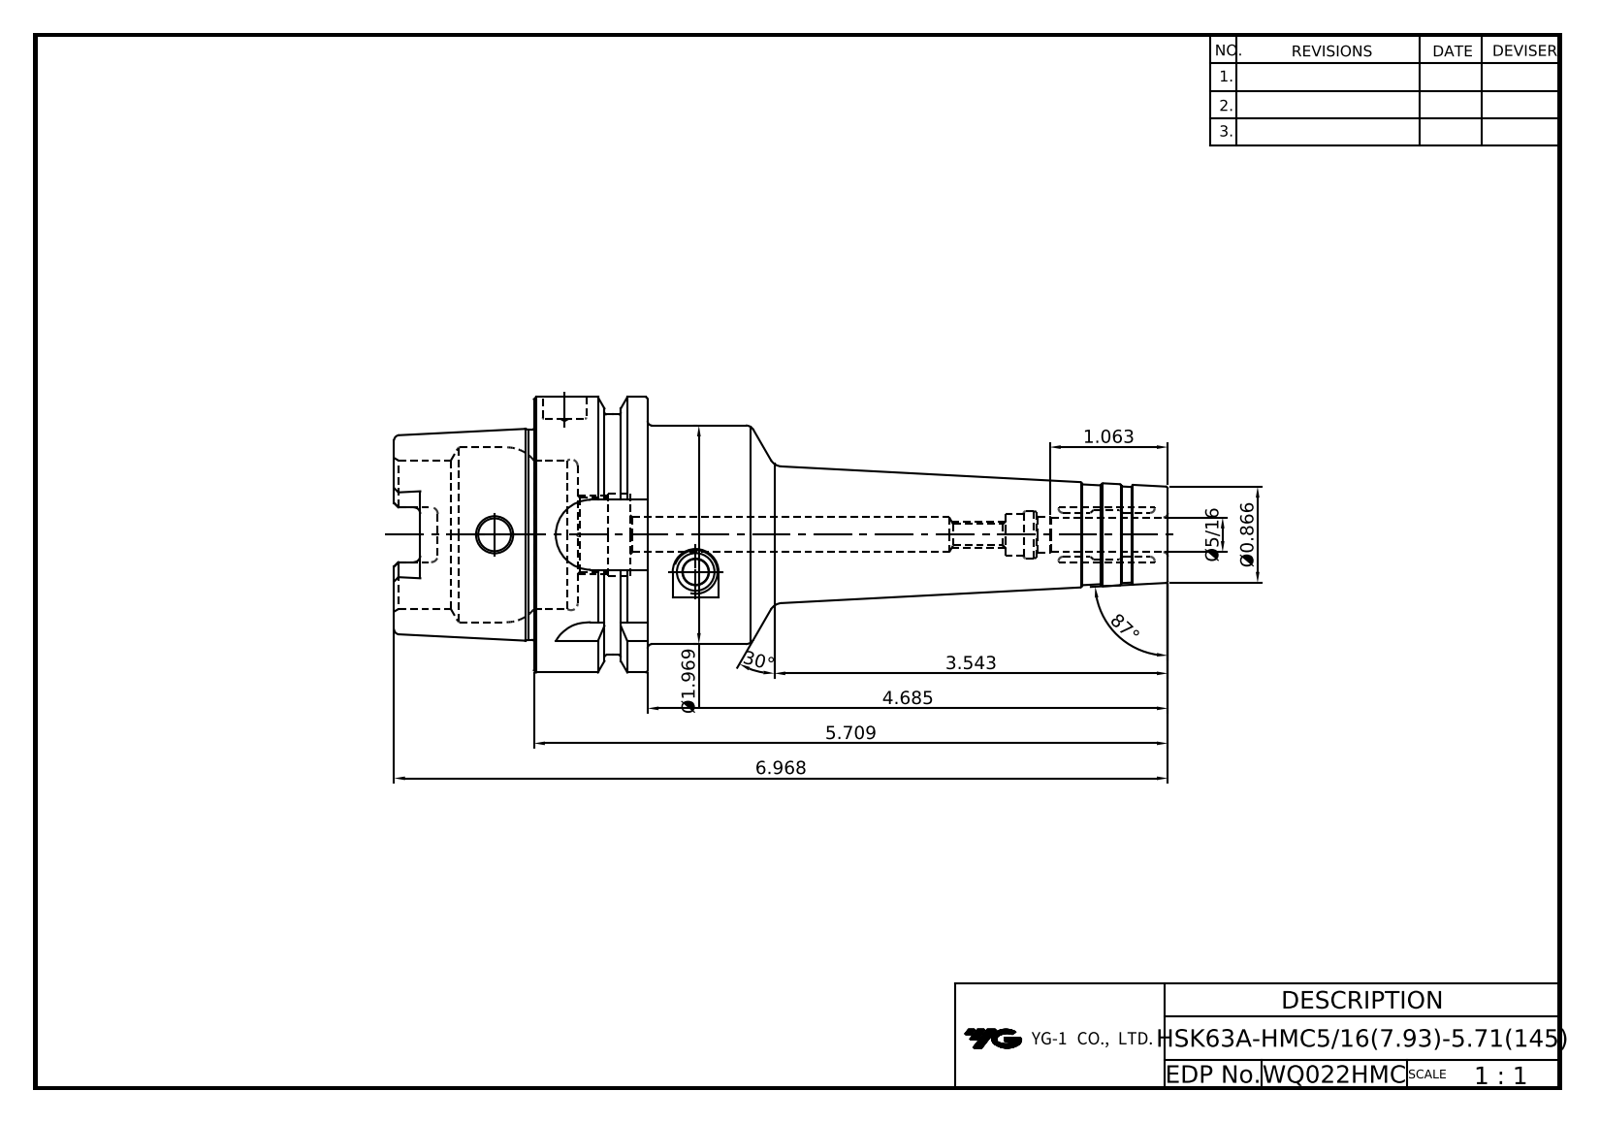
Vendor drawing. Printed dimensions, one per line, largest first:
87°
30°
6.968
5.709
4.685
3.543
Ø1.969
1.063
Ø0.866
Ø5/16
